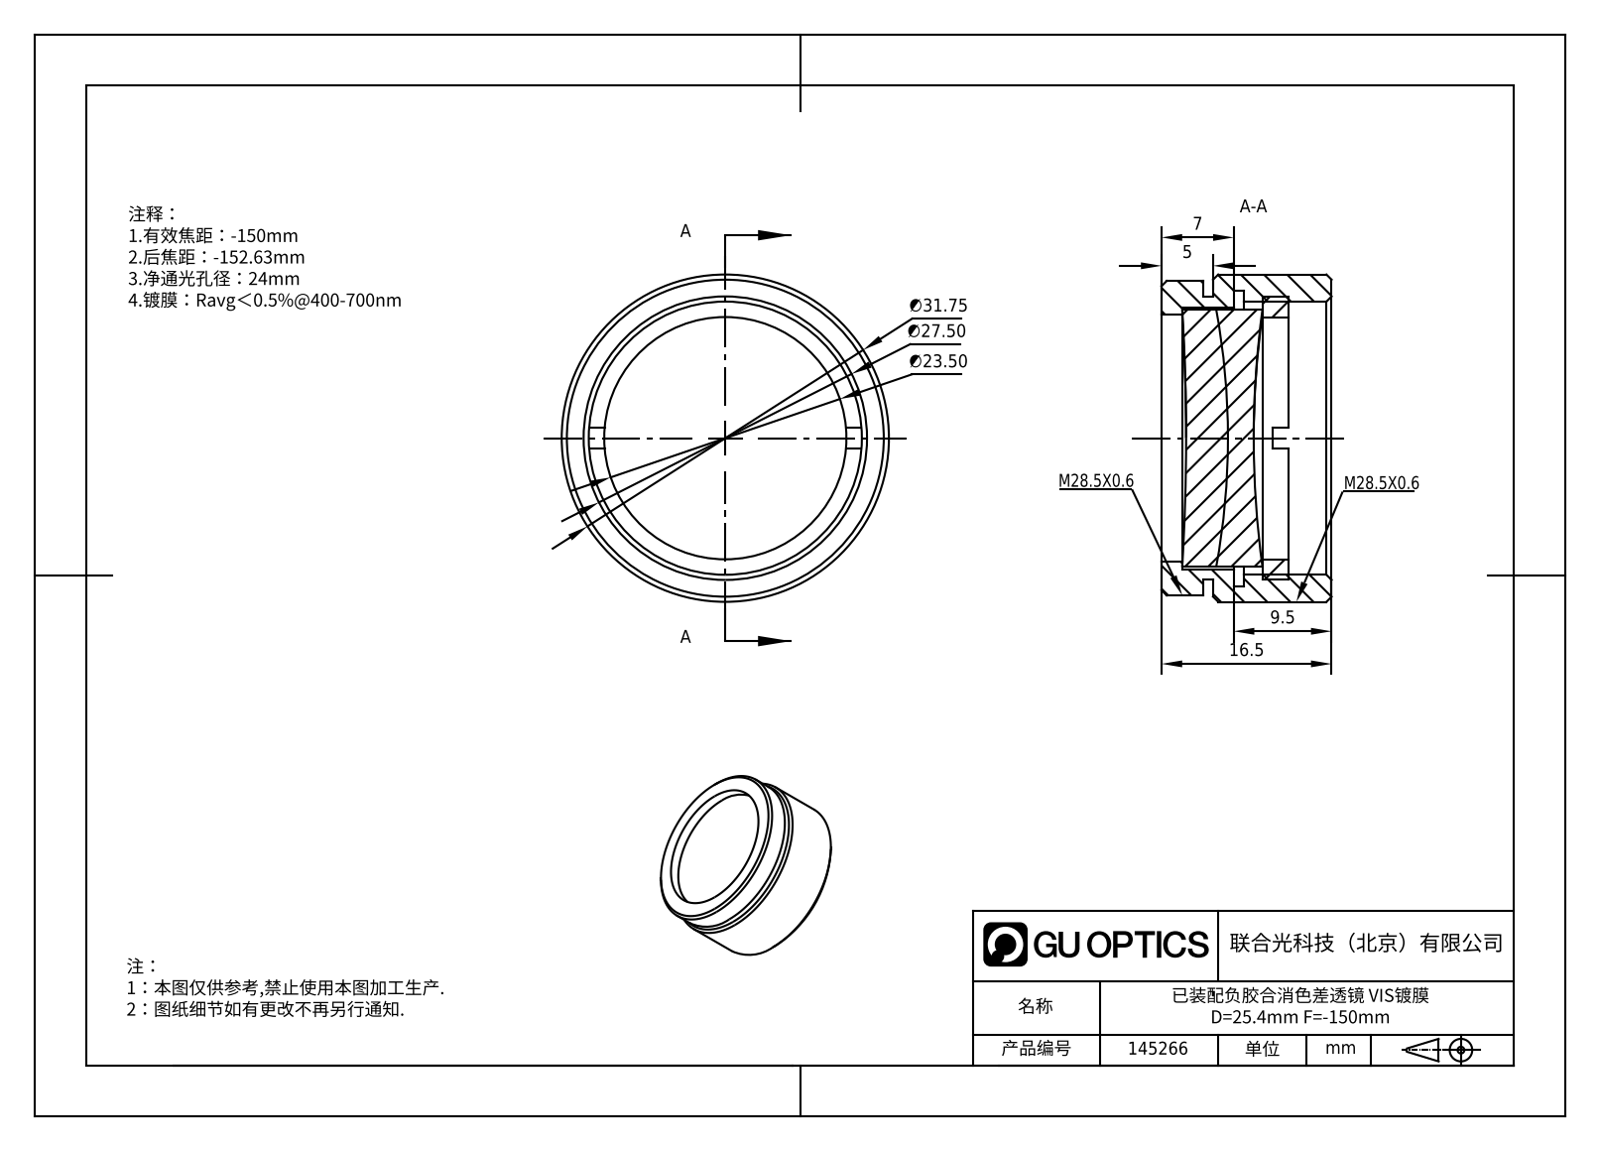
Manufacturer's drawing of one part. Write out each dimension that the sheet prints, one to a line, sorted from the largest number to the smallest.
∅31.75
∅27.50
∅23.50
16.5
9.5
7
5
